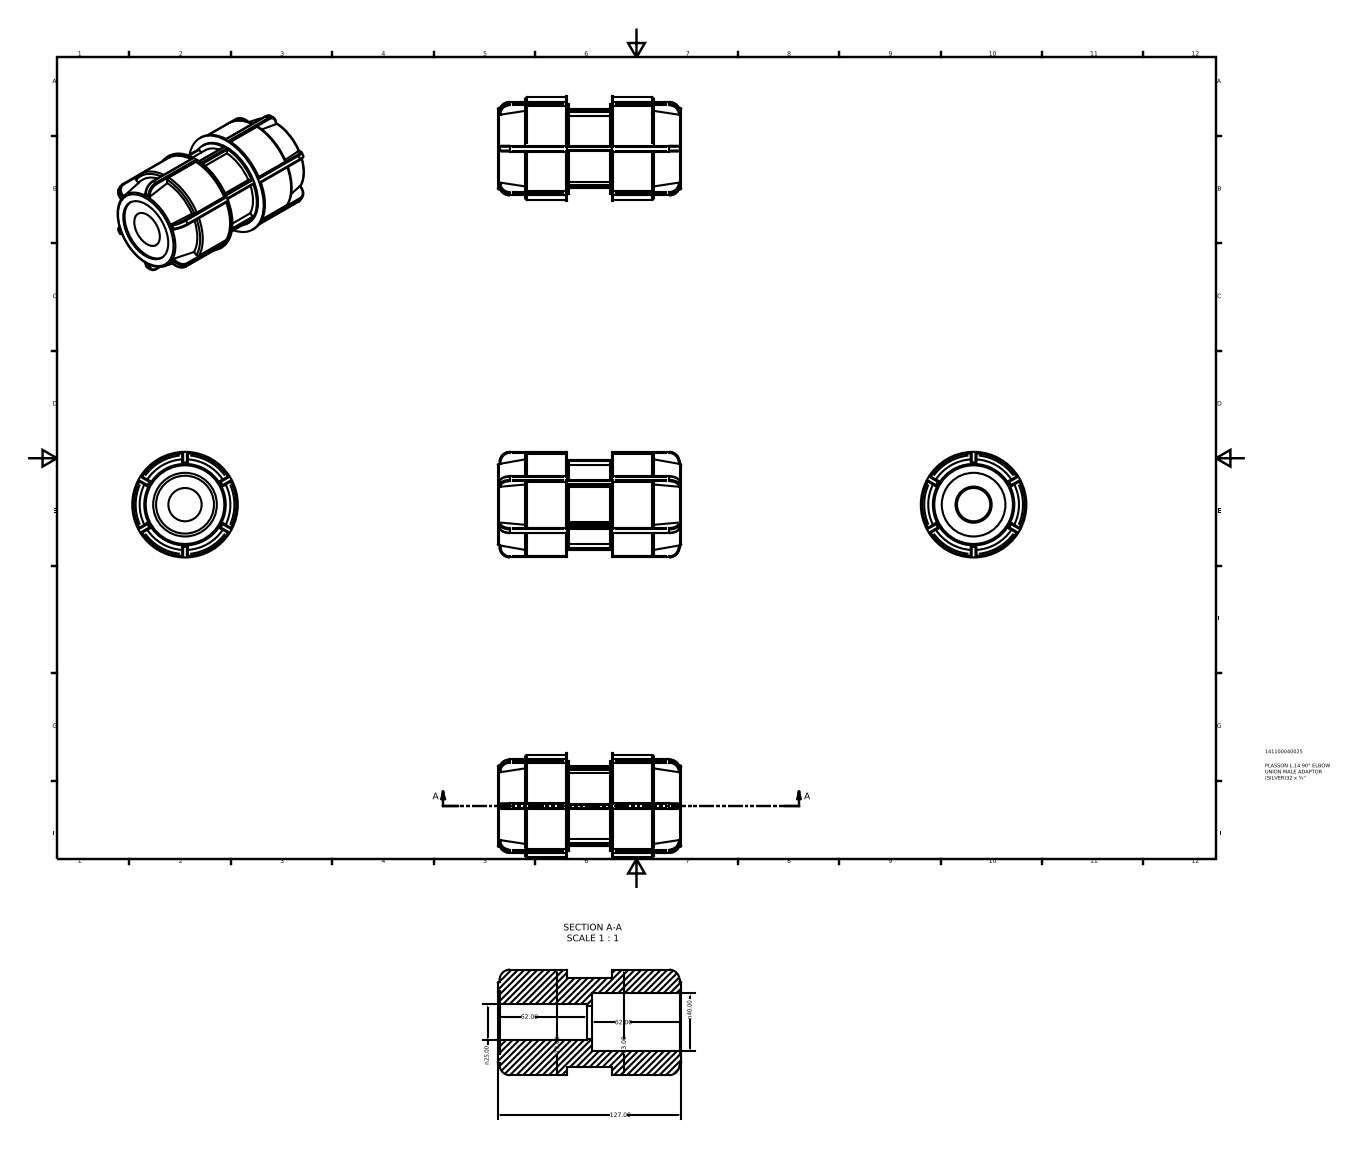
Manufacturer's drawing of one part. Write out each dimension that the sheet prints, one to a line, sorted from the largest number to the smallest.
127.00
73.00
73.00
62.00
62.00
n40.00
n25.00
